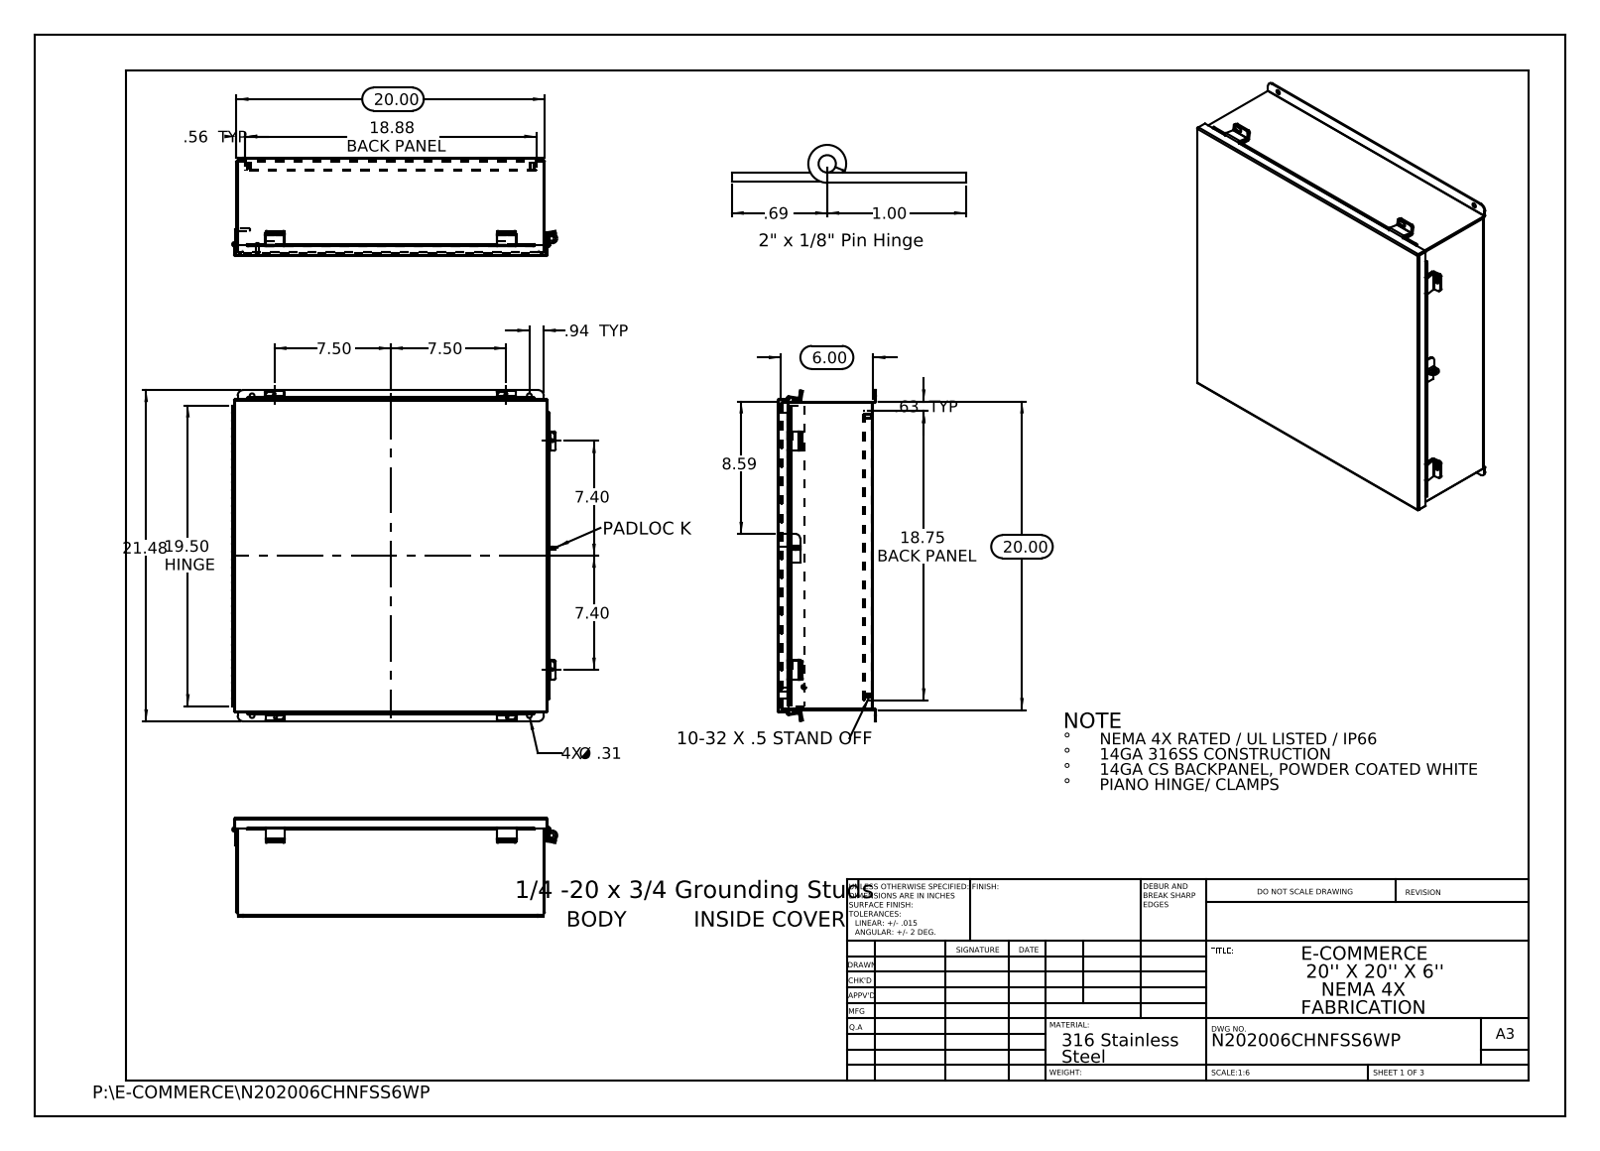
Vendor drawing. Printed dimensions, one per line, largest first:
21.48
20.00
20.00
19.50 HINGE
18.88 BACK PANEL
18.75 BACK PANEL
8.59
7.50
7.50
7.40
7.40
6.00
1.00
.94 TYP
.69
.63 TYP
.56 TYP
4X Ø .31
